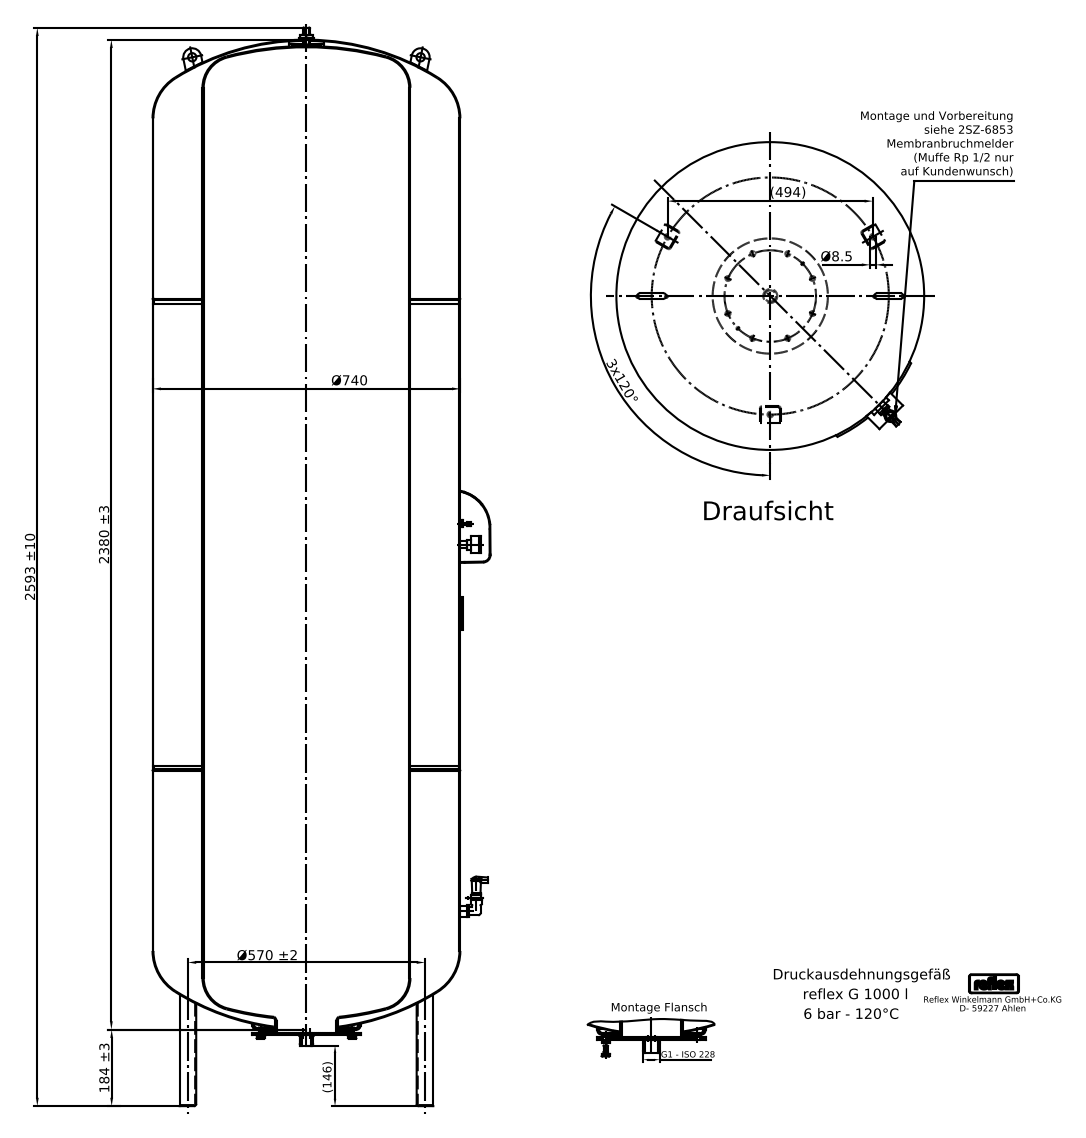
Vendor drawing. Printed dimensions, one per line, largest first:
2593 ±10
2380 ±3
Ø740
Ø570 ±2
(494)
184 ±3
(146)
3x120°
Ø8.5
G1 - ISO 228
